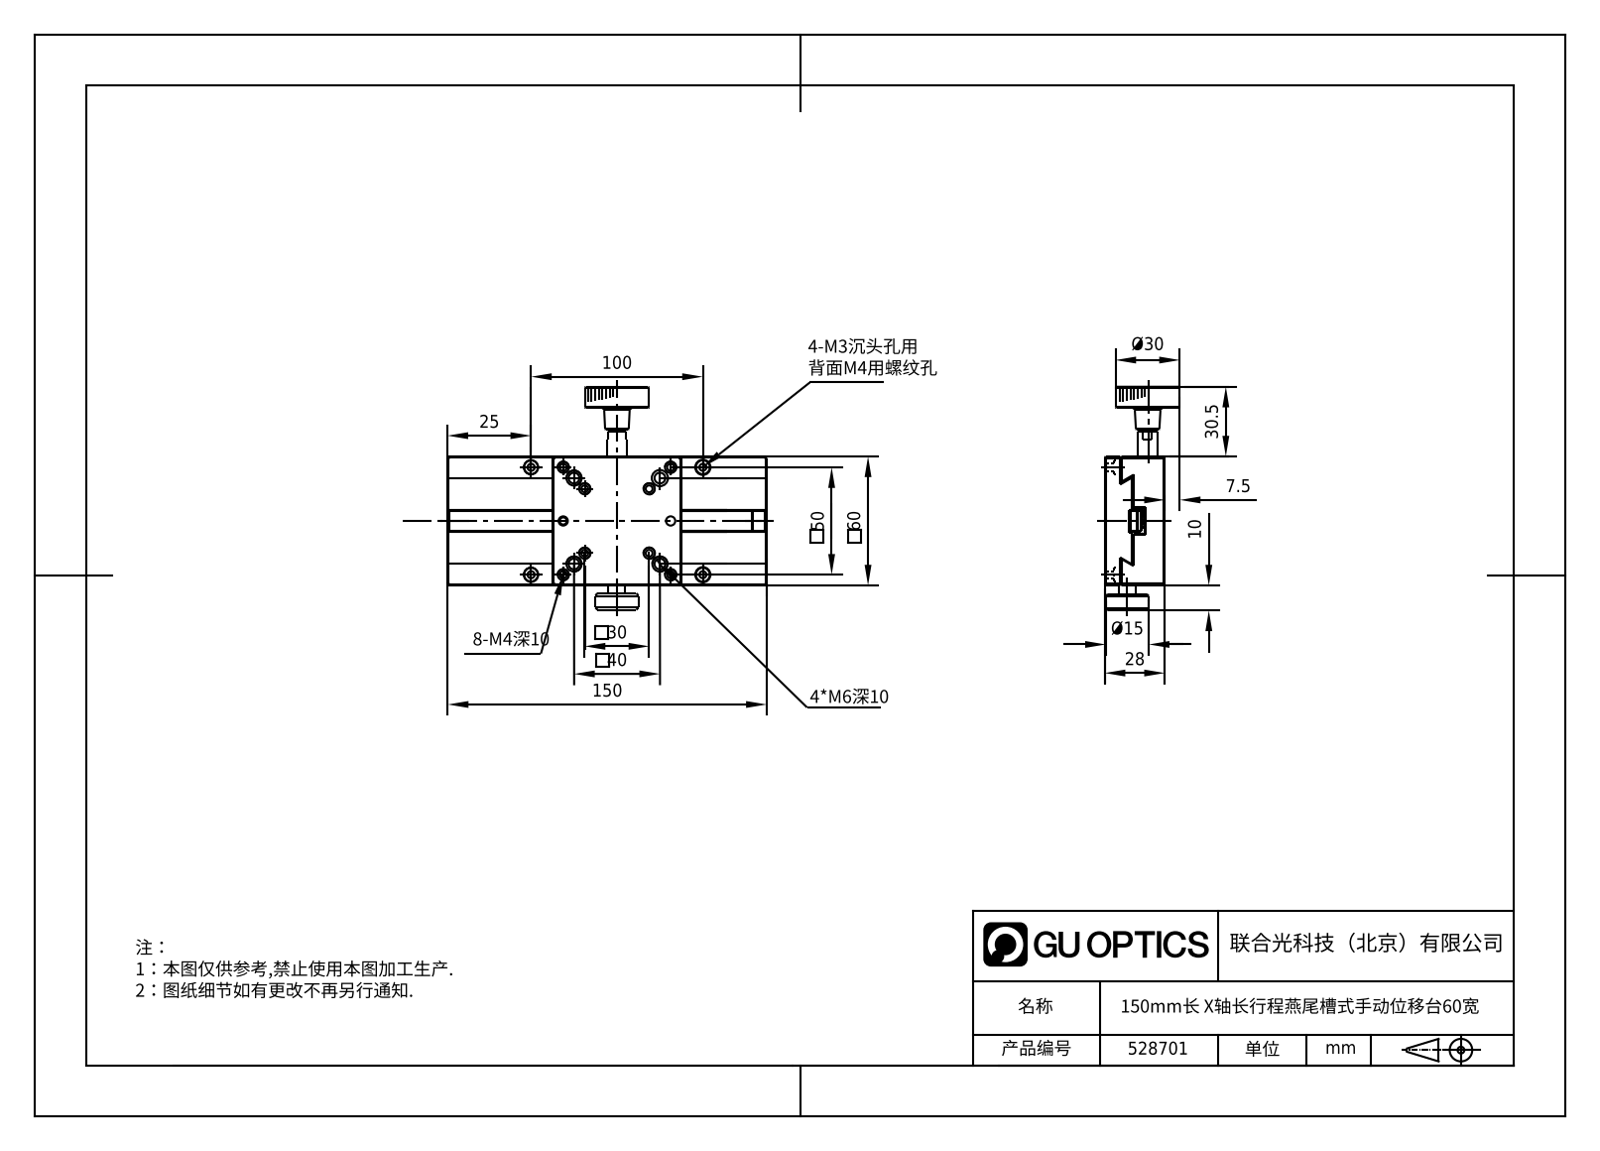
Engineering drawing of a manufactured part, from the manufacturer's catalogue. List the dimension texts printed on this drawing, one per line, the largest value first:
150
100
60
50
40
30.5
30
Ø30
28
25
Ø15
10
7.5
